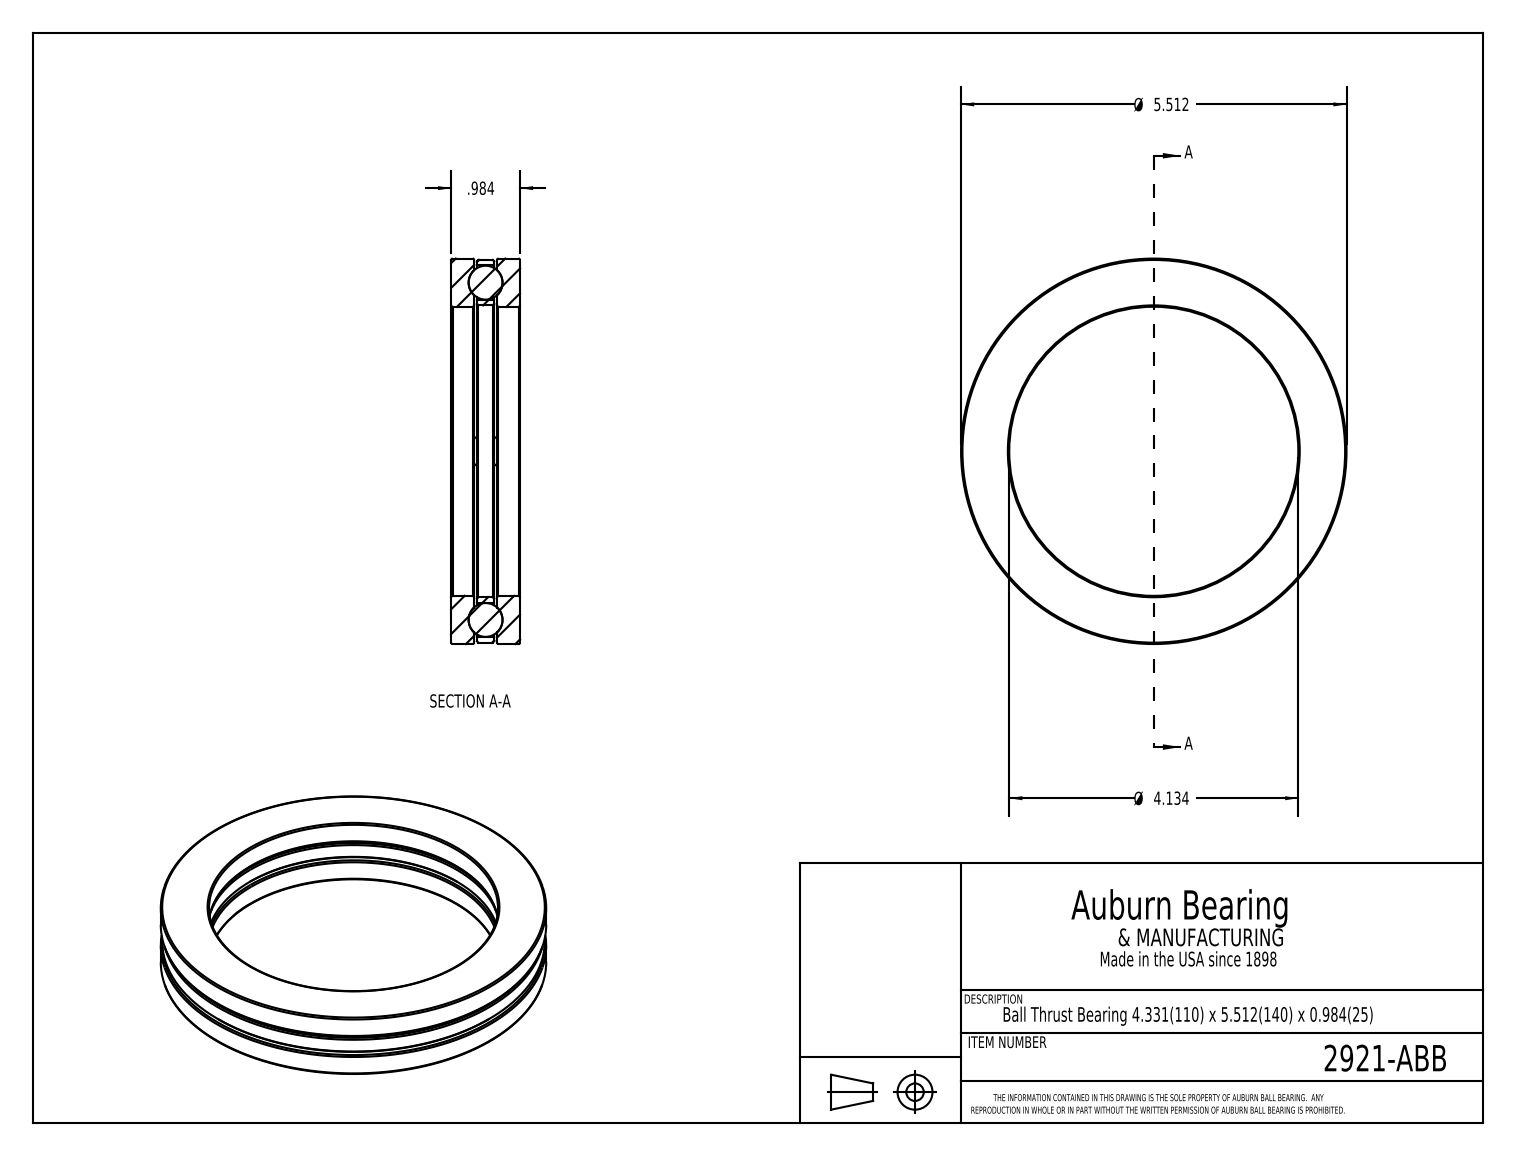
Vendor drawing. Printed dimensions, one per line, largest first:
Ø 5.512
Ø 4.134
.984
